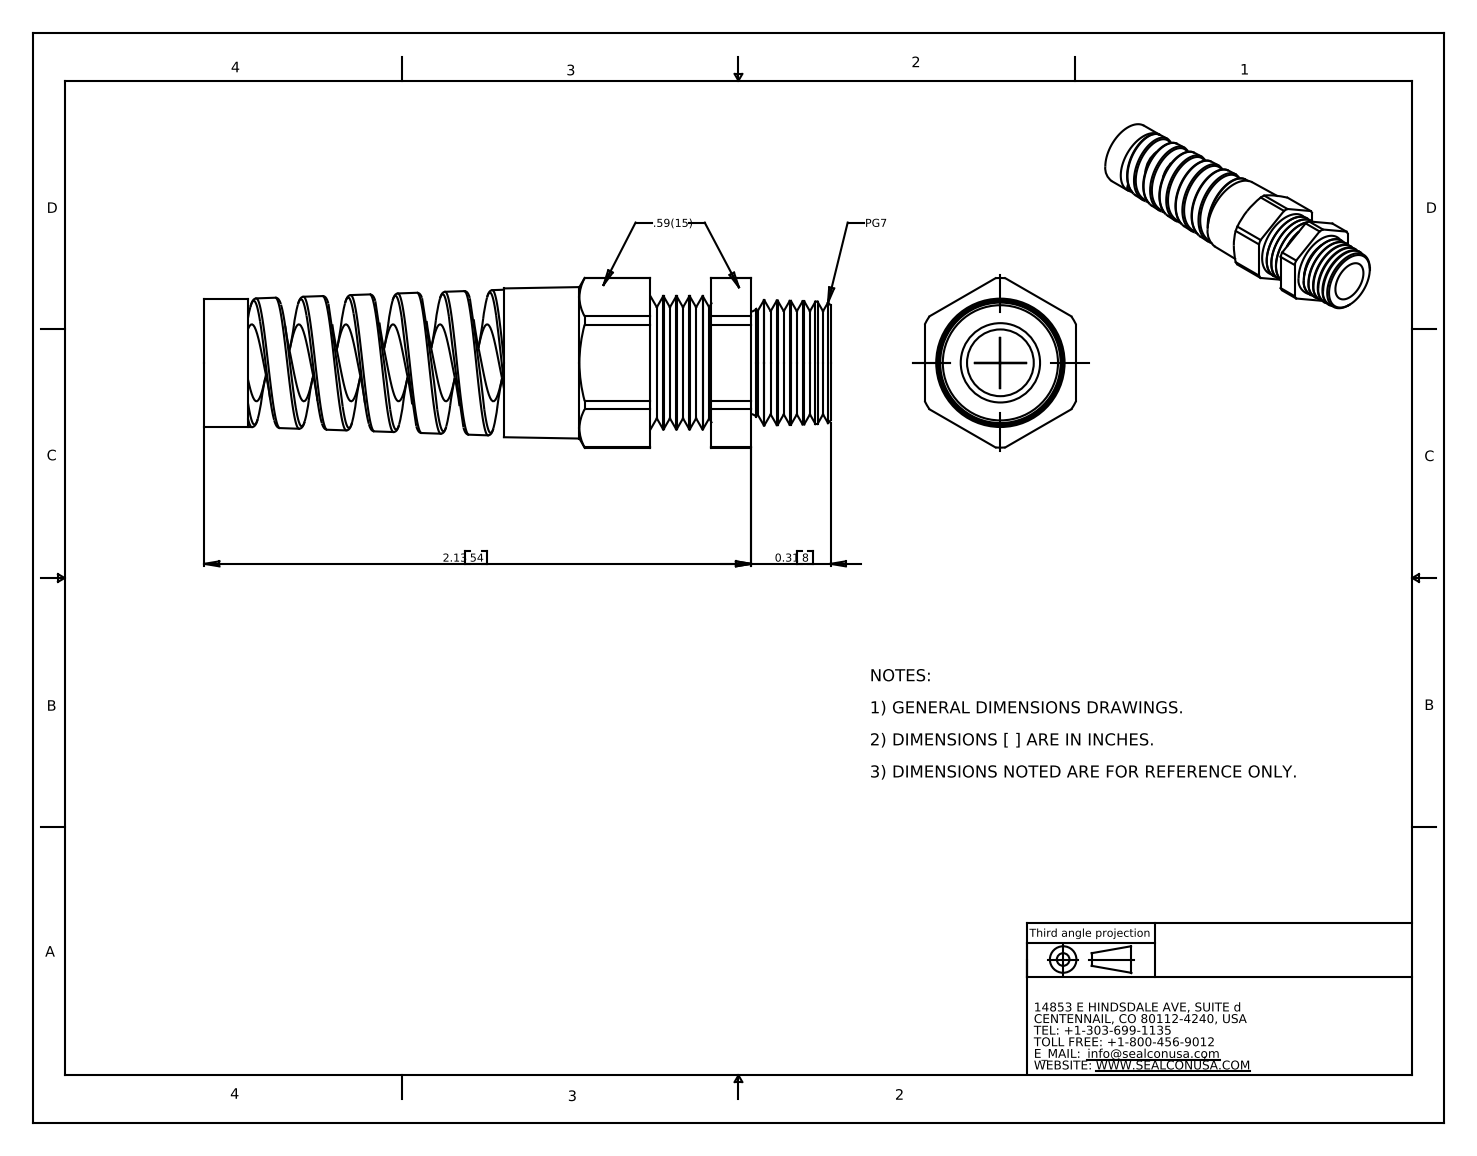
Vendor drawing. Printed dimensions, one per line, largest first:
2.13 54
0.31 8
